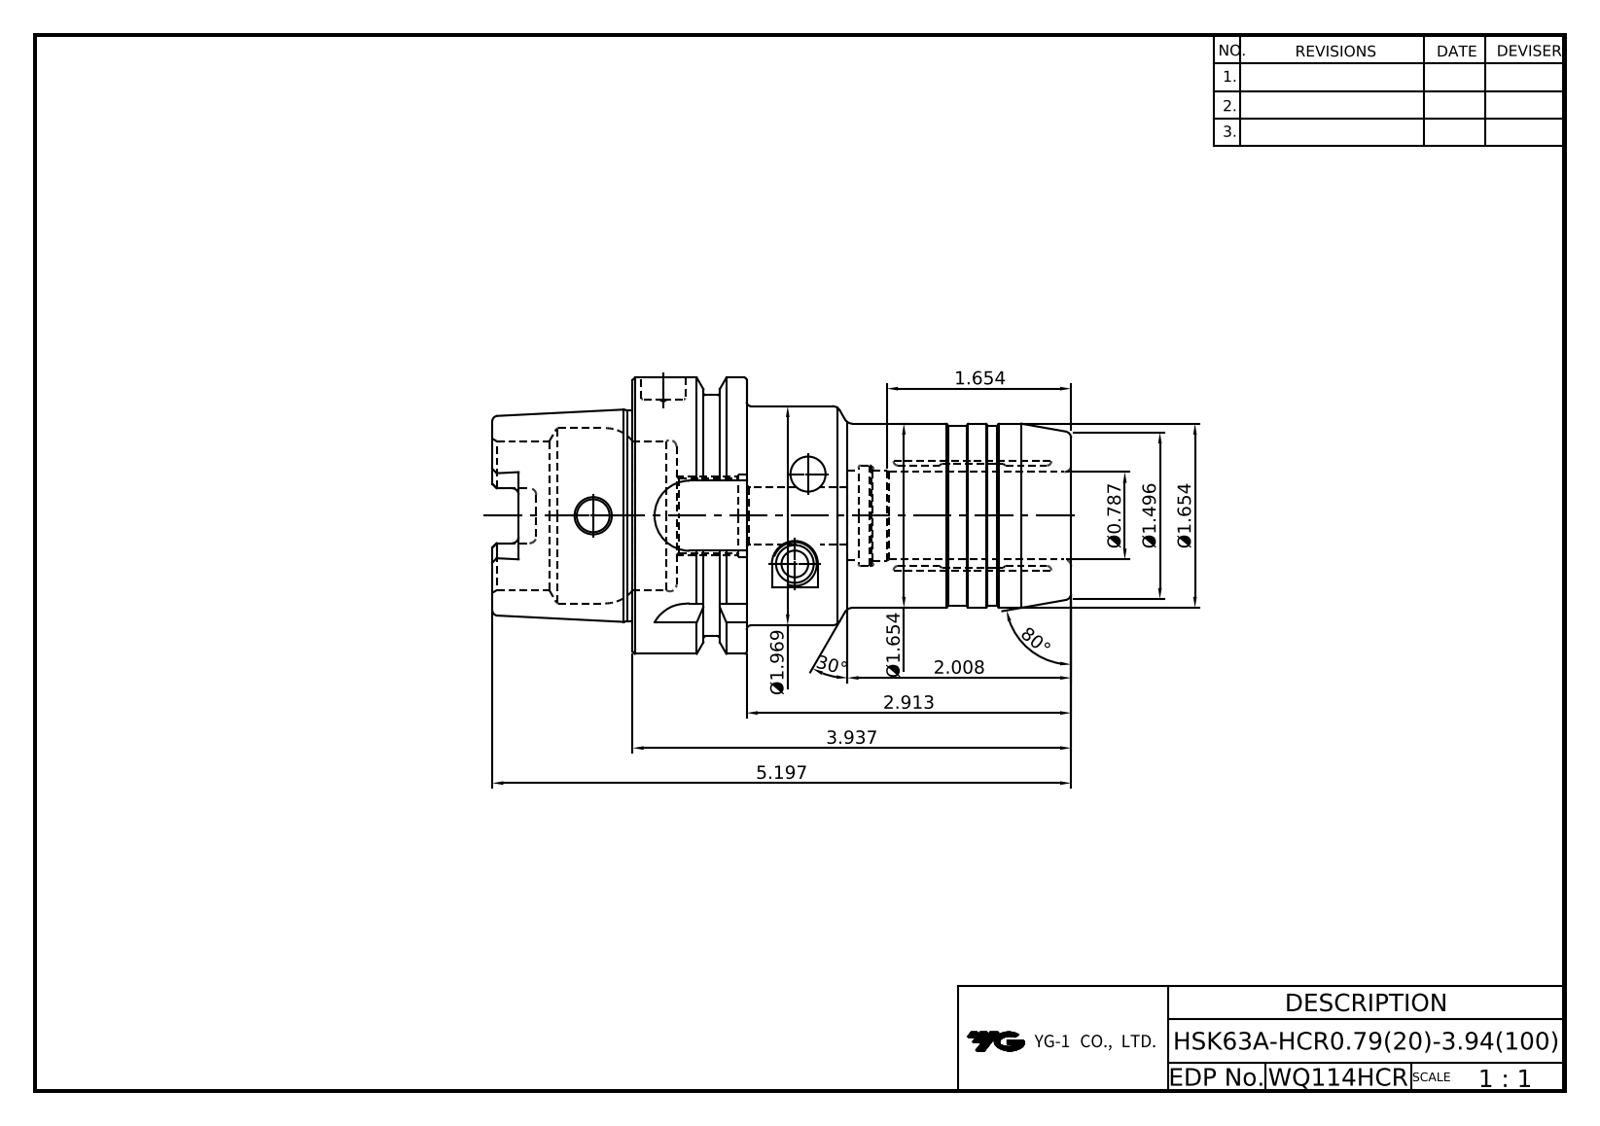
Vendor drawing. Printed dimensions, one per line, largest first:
80°
30°
5.197
3.937
2.913
2.008
Ø1.969
Ø1.654
Ø1.654
1.654
Ø1.496
Ø0.787
